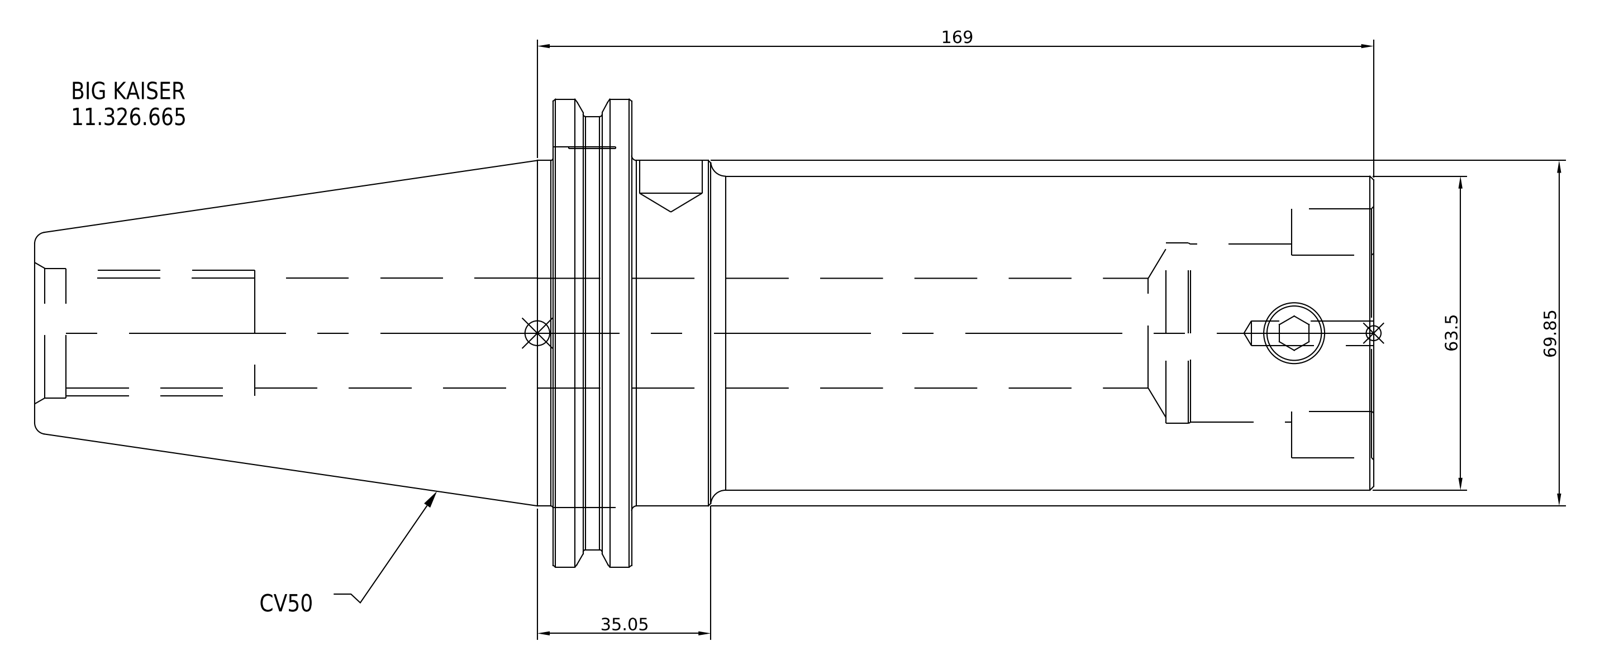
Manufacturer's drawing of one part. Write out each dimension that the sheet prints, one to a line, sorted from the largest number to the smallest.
169
69.85
63.5
35.05
